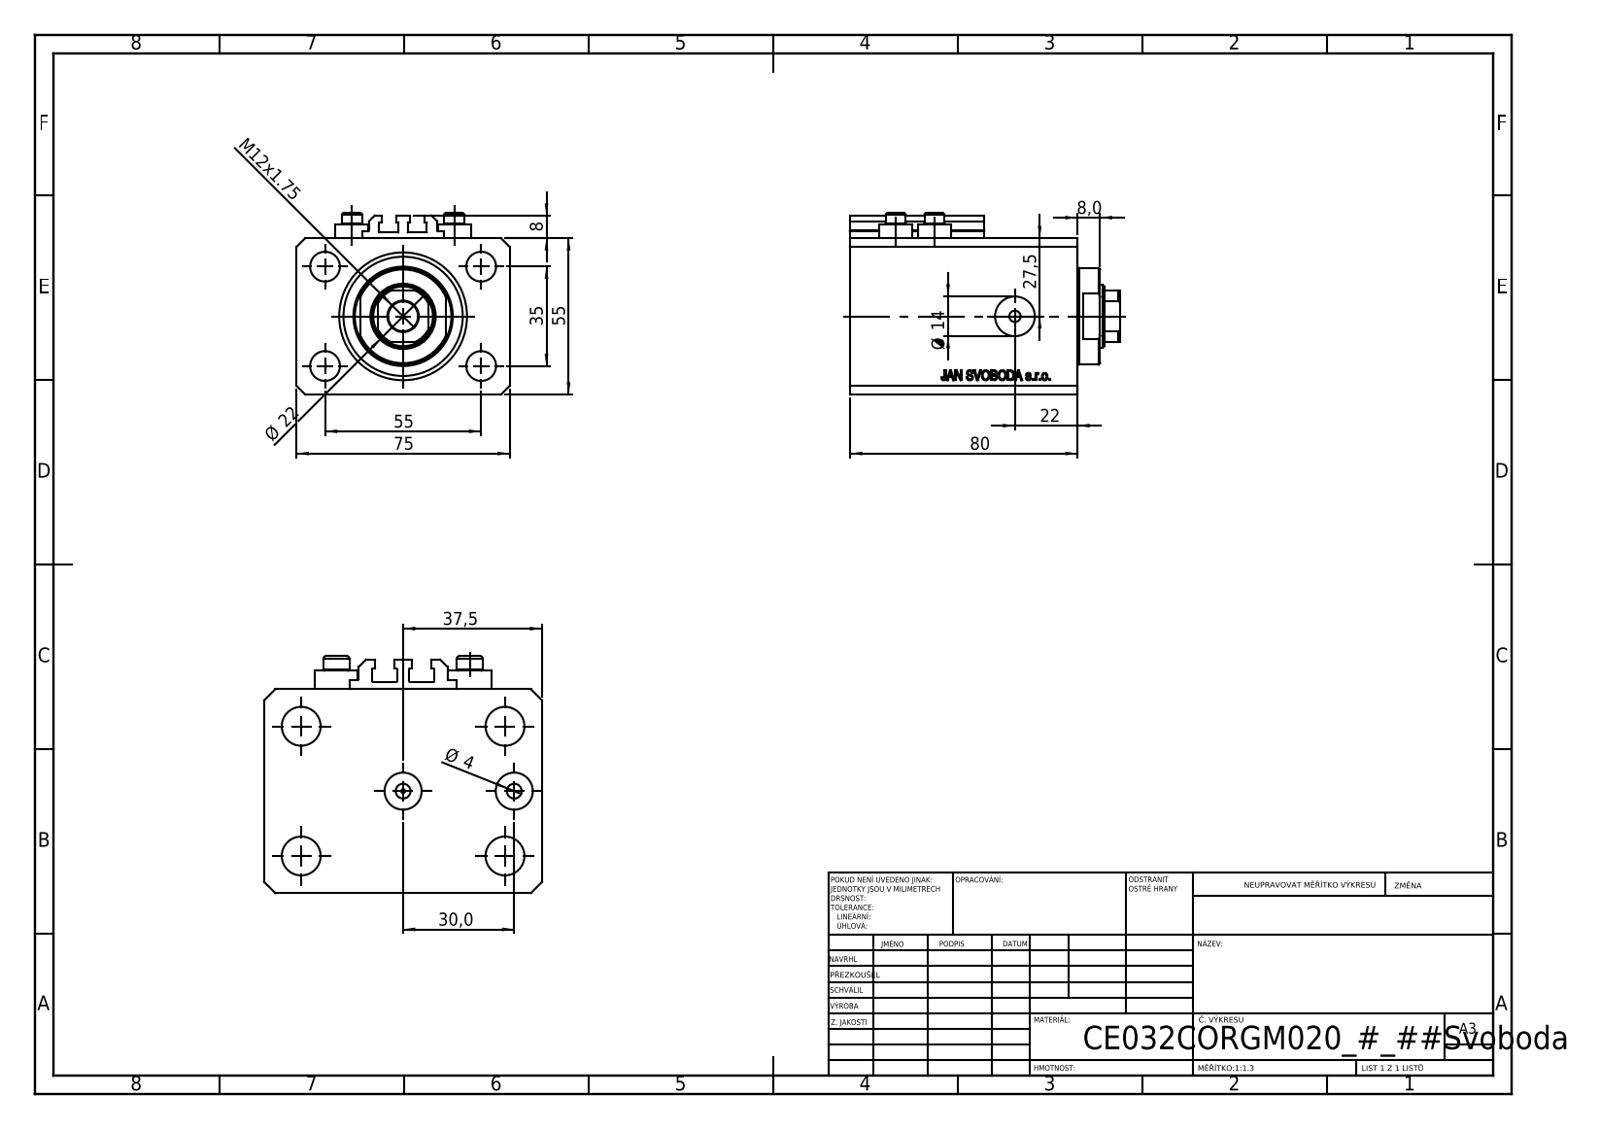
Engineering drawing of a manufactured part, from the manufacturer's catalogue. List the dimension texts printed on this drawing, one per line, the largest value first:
80
75
55
55
37,5
35
30,0
27,5
Ø 22
22
Ø 14
M12x1.75
8
8,0
Ø 4
